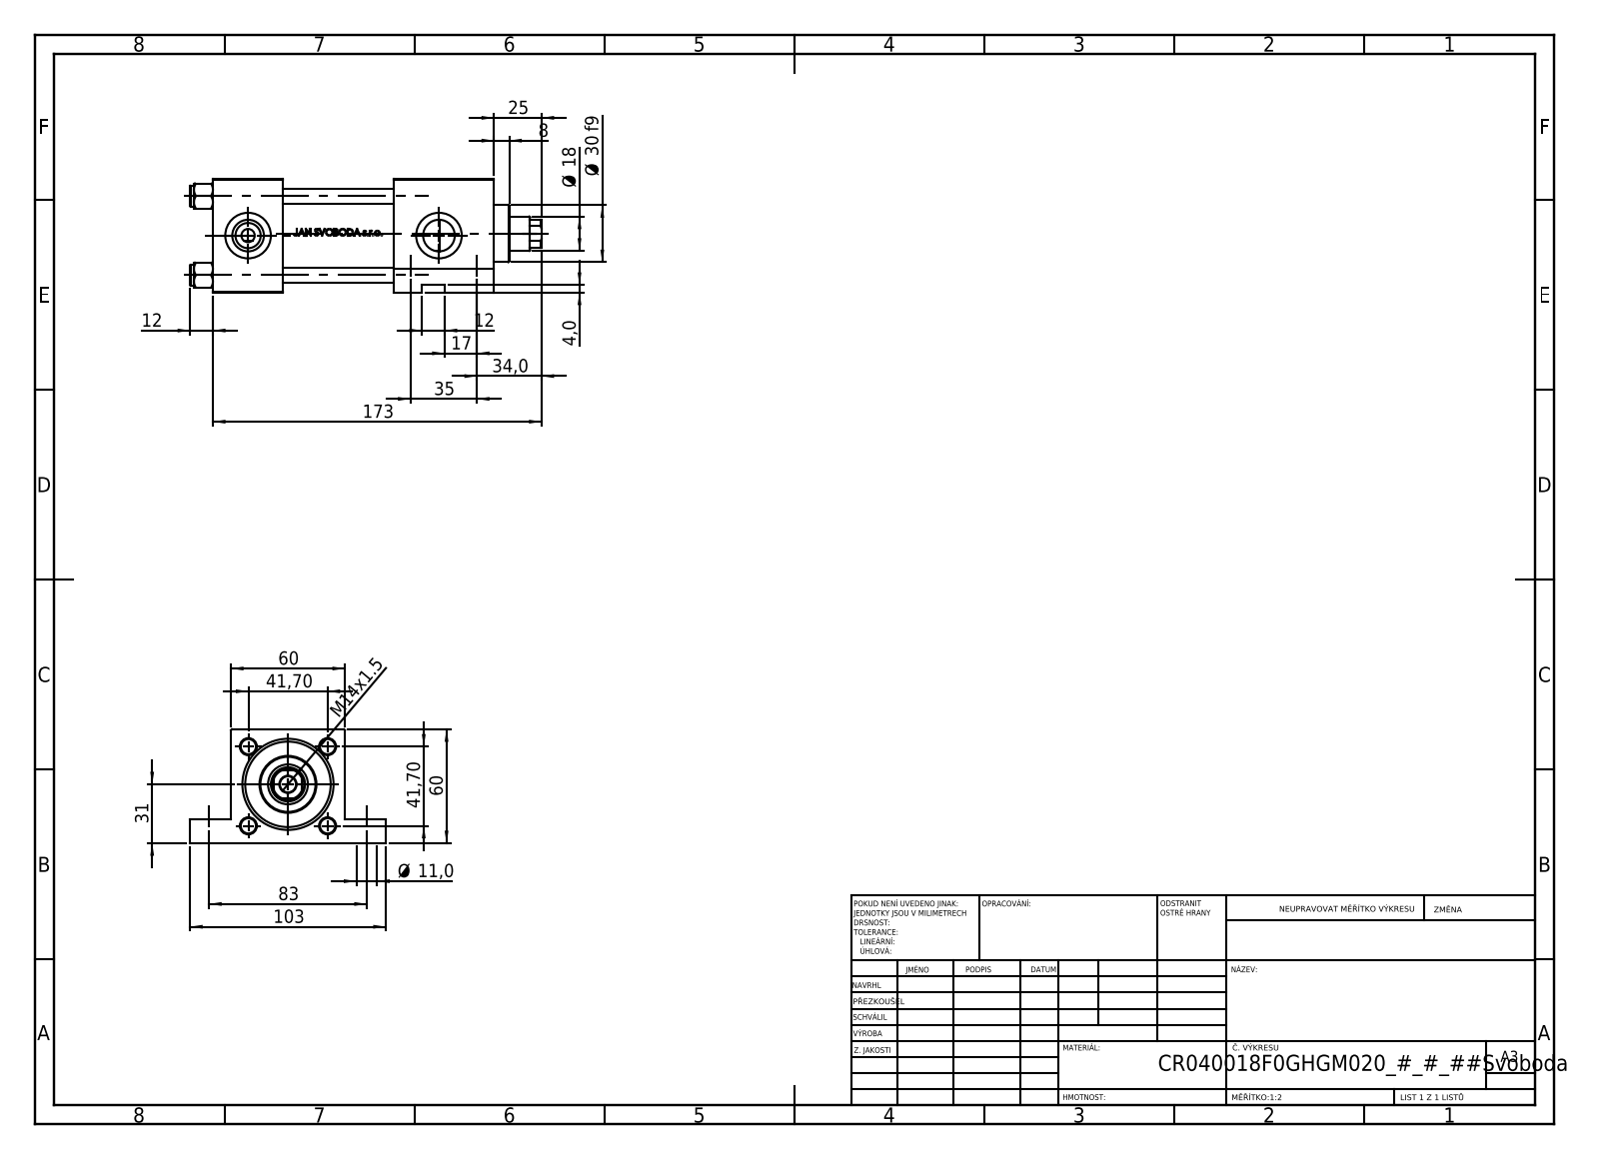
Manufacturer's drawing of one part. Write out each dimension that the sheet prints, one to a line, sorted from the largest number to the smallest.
173
103
83
60
60
41,70
41,70
35
34,0
31
Ø 30 f9
25
Ø 18
17
M14x1.5
12
12
Ø 11,0
8
4,0
